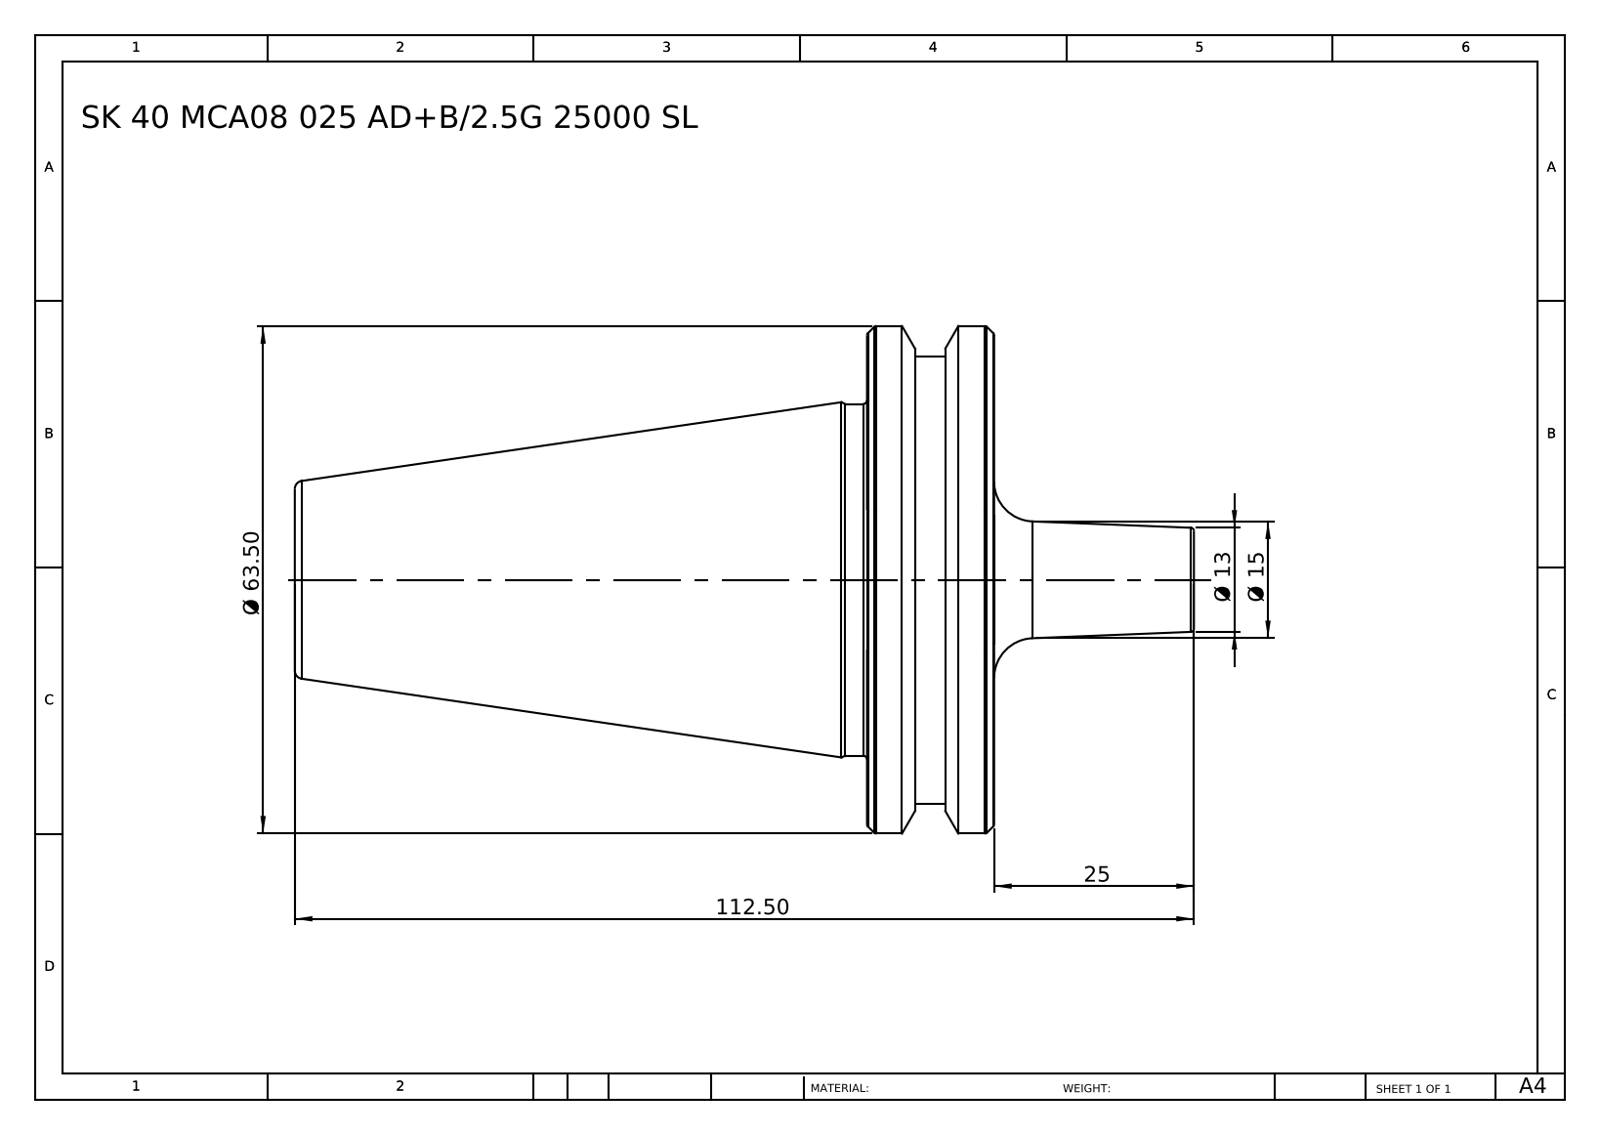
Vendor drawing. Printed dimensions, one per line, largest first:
112.50
Ø 63.50
25
Ø 15
Ø 13
